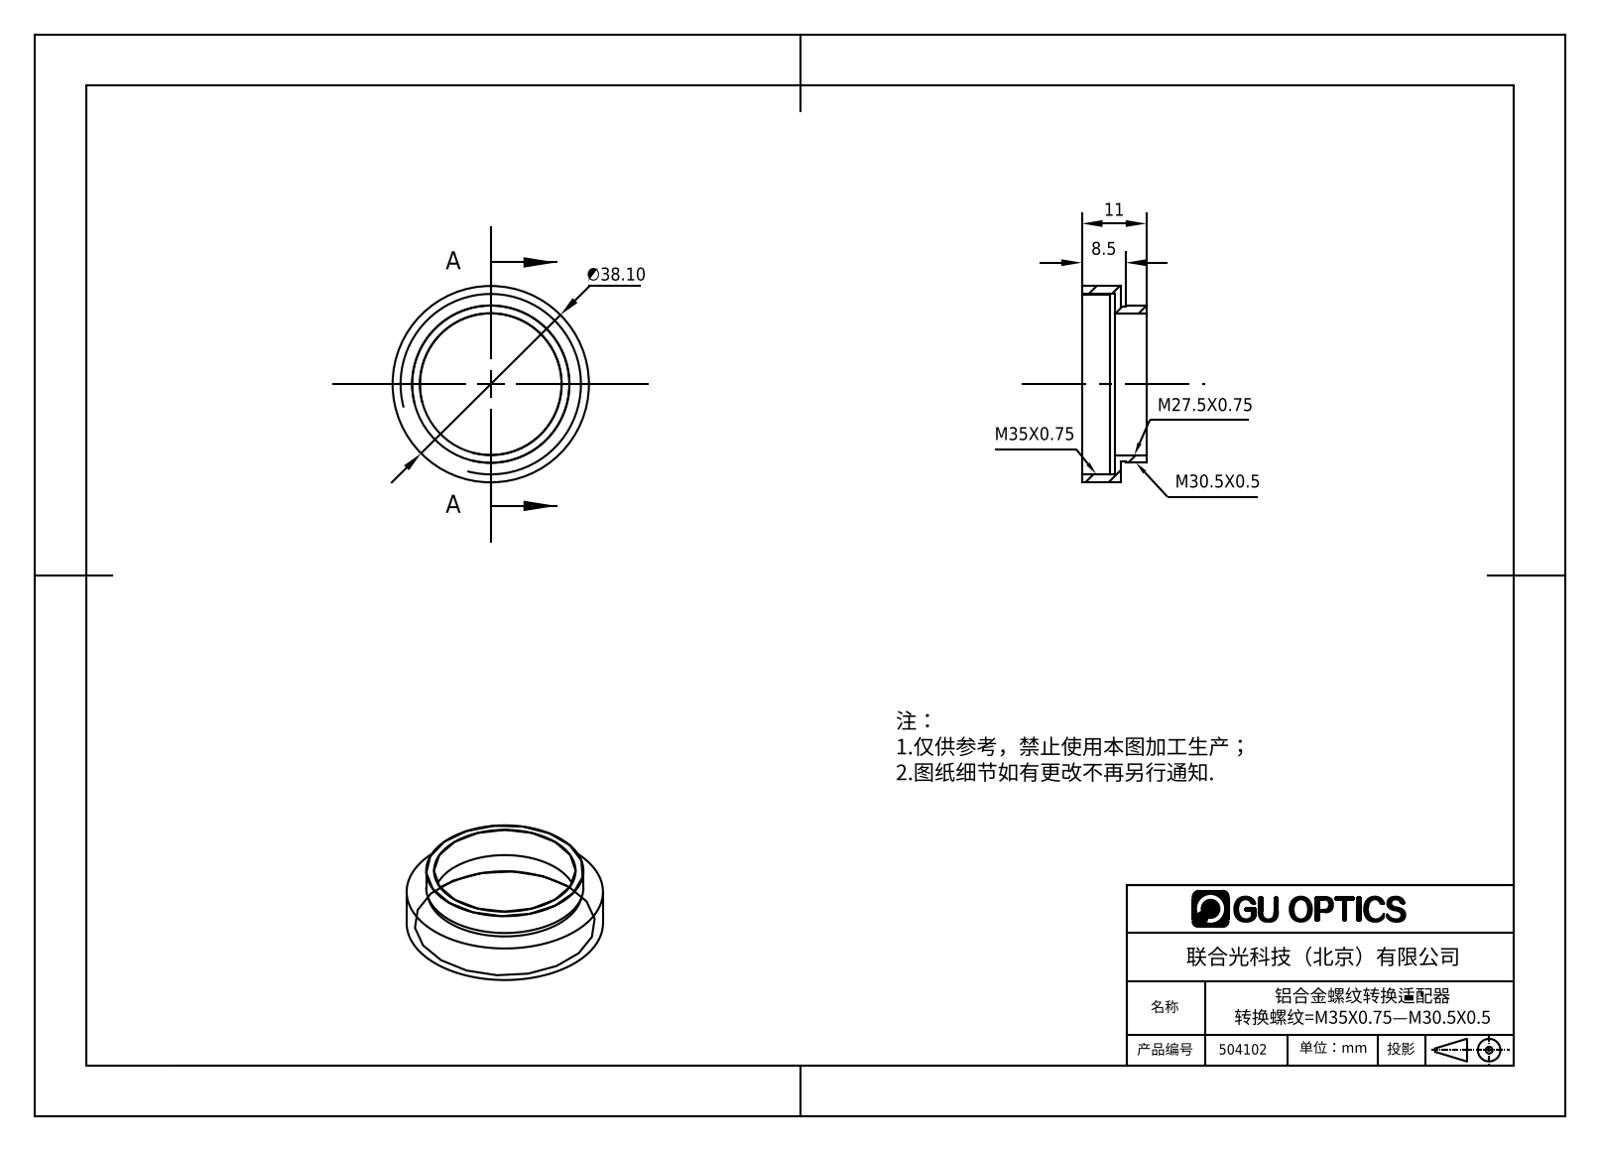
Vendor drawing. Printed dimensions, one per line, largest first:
∅38.10
11
8.5
